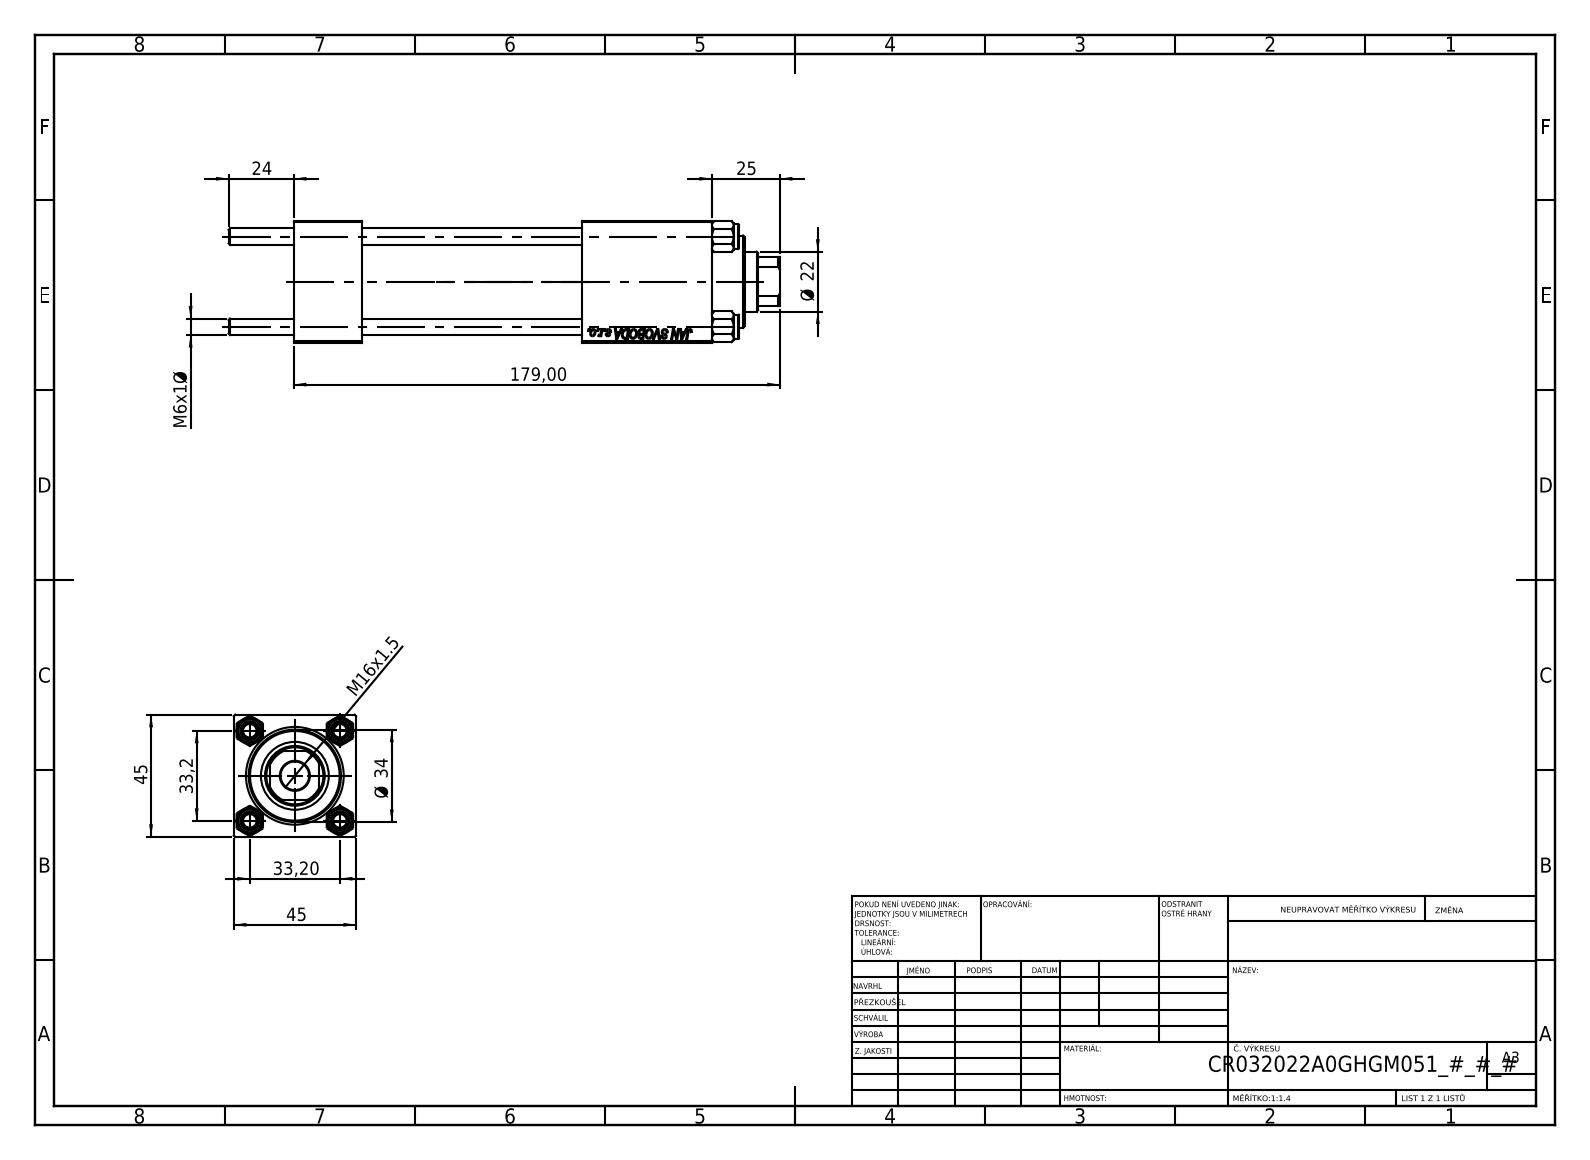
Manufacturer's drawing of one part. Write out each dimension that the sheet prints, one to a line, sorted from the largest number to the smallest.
179,00
45
45
Ø 34
33,2
33,20
25
24
Ø 22
M16x1.5
M6x1 Ø
